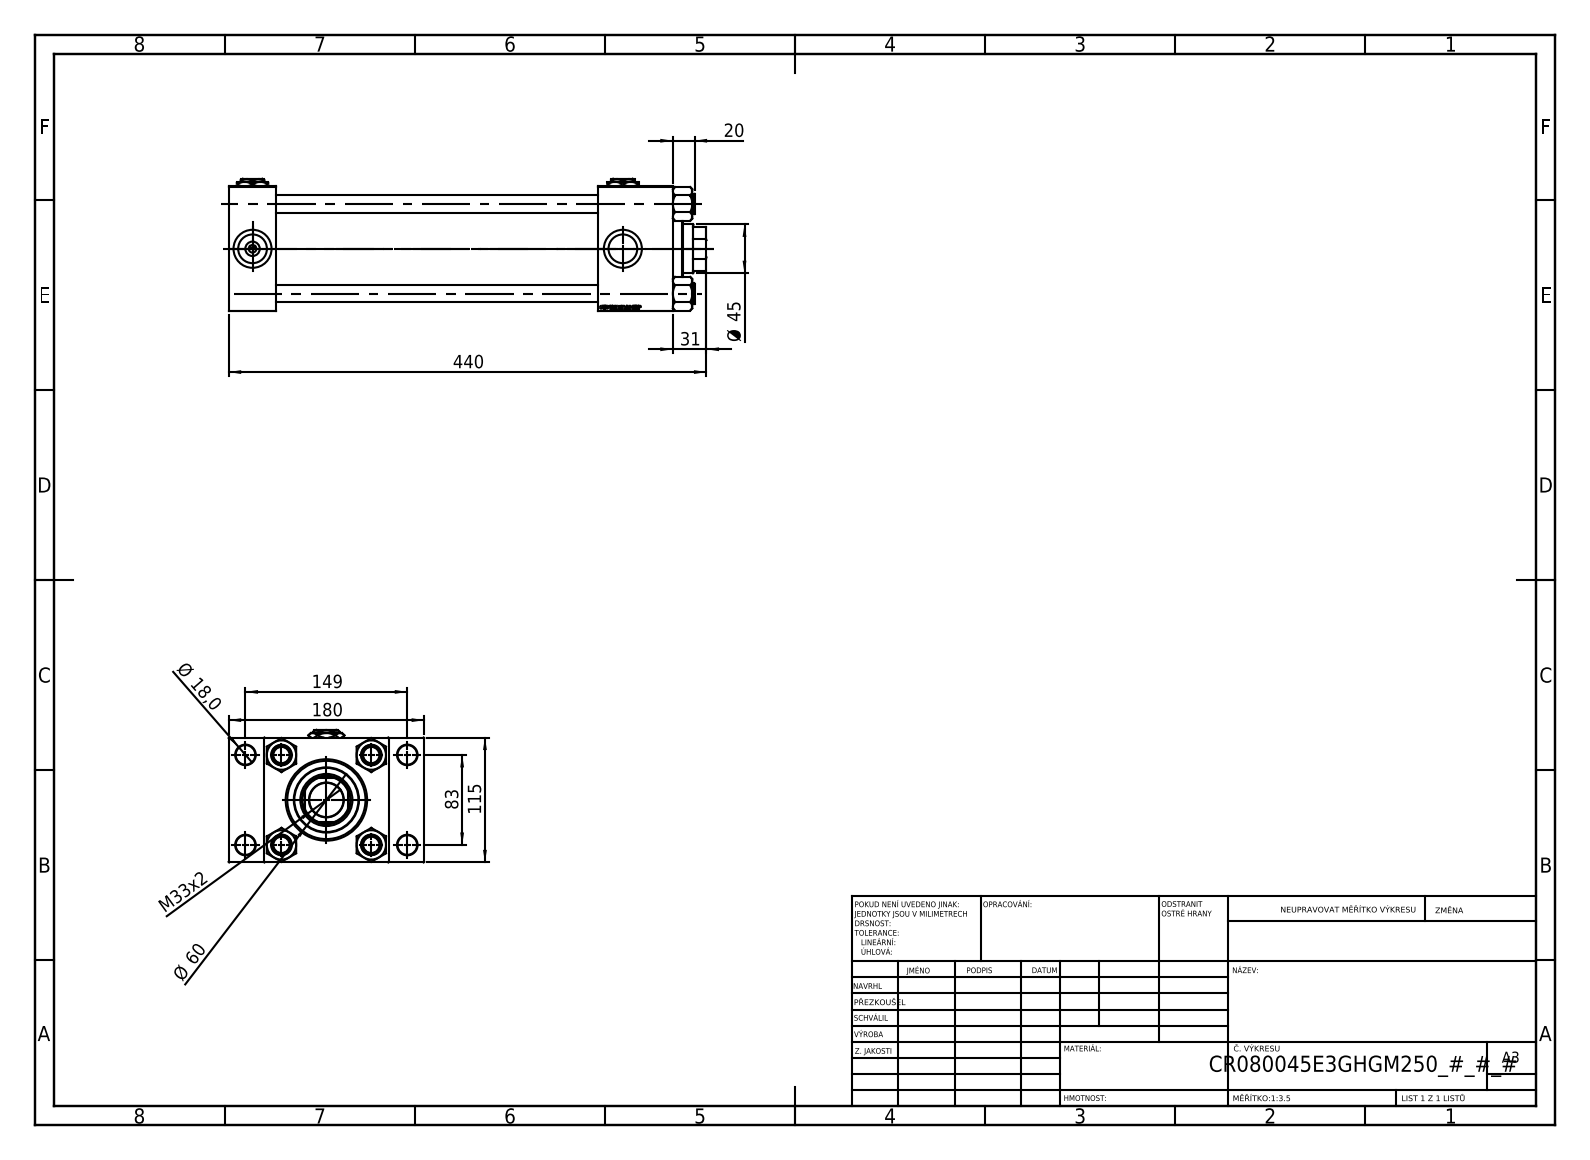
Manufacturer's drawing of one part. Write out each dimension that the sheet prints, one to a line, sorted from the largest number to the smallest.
440
180
149
115
83
Ø 60
Ø 45
M33x2
31
20
Ø 18,0
